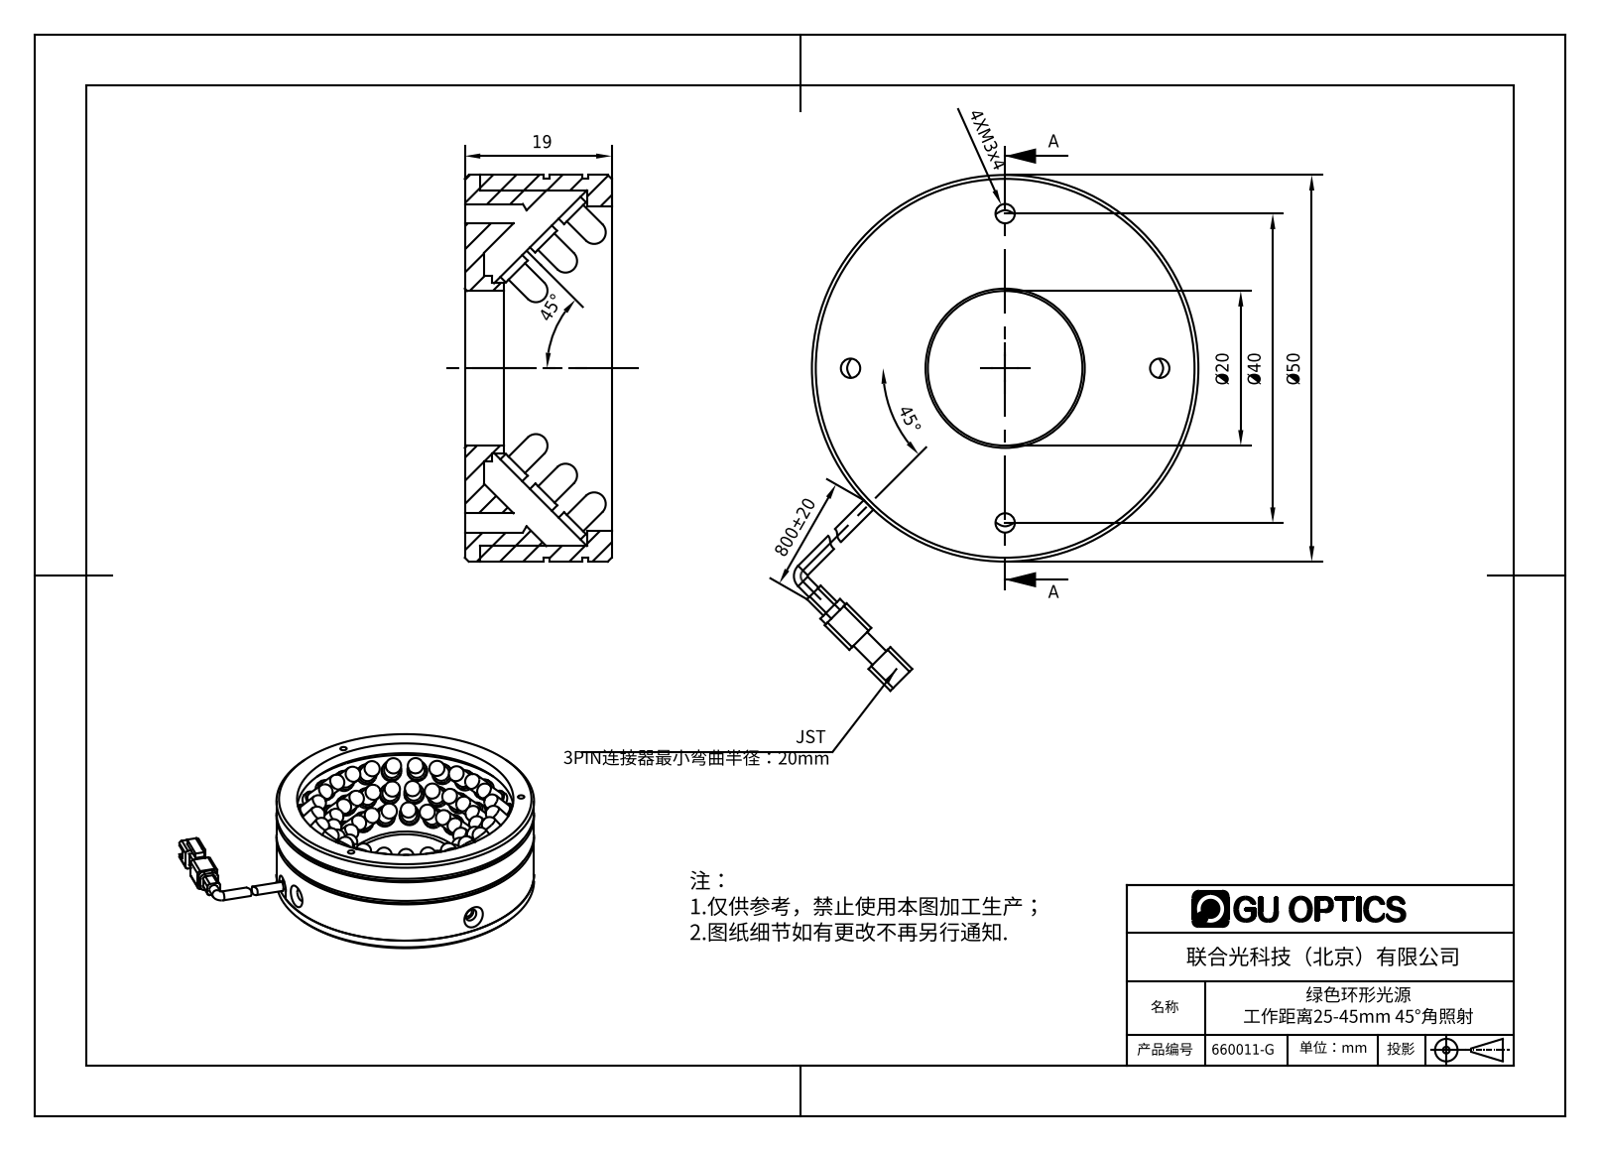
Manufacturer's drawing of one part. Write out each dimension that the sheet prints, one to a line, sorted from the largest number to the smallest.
800±20
Ø50
45°
45°
Ø40
Ø20
19
4XM3x4
